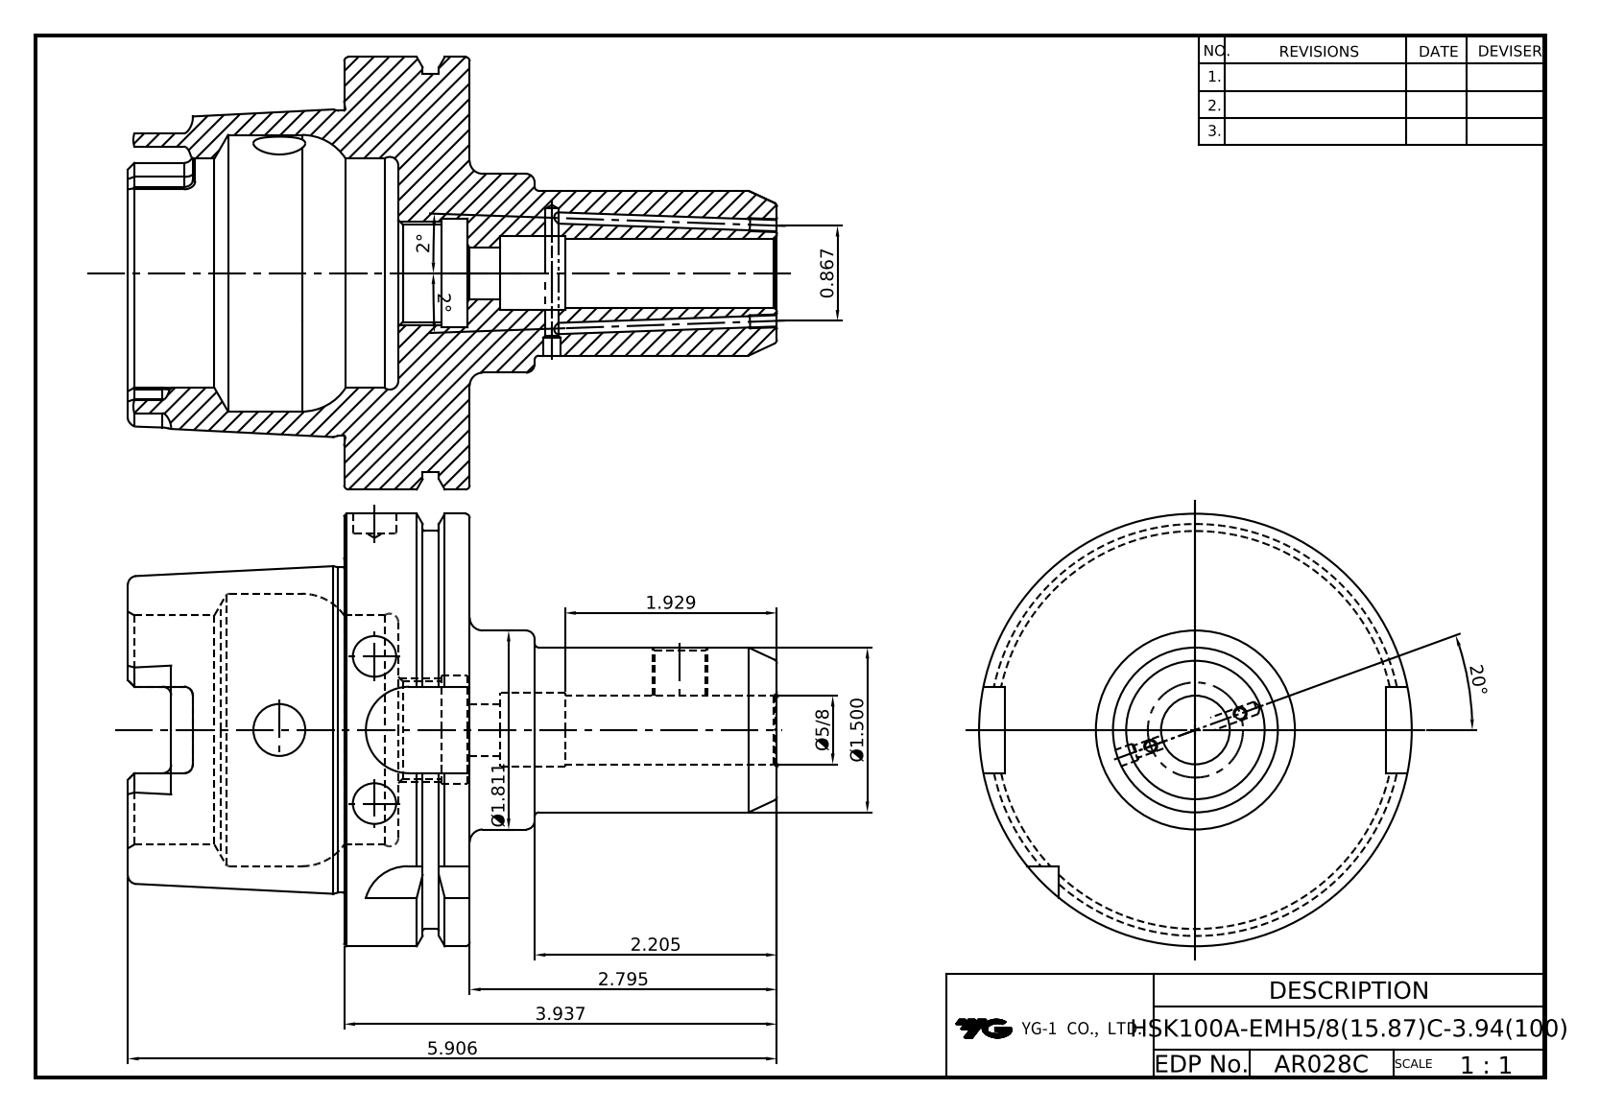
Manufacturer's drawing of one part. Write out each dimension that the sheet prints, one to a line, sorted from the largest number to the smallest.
20°
5.906
3.937
2.795
2.205
2°
2°
1.929
Ø1.811
Ø1.500
0.867
Ø5/8
